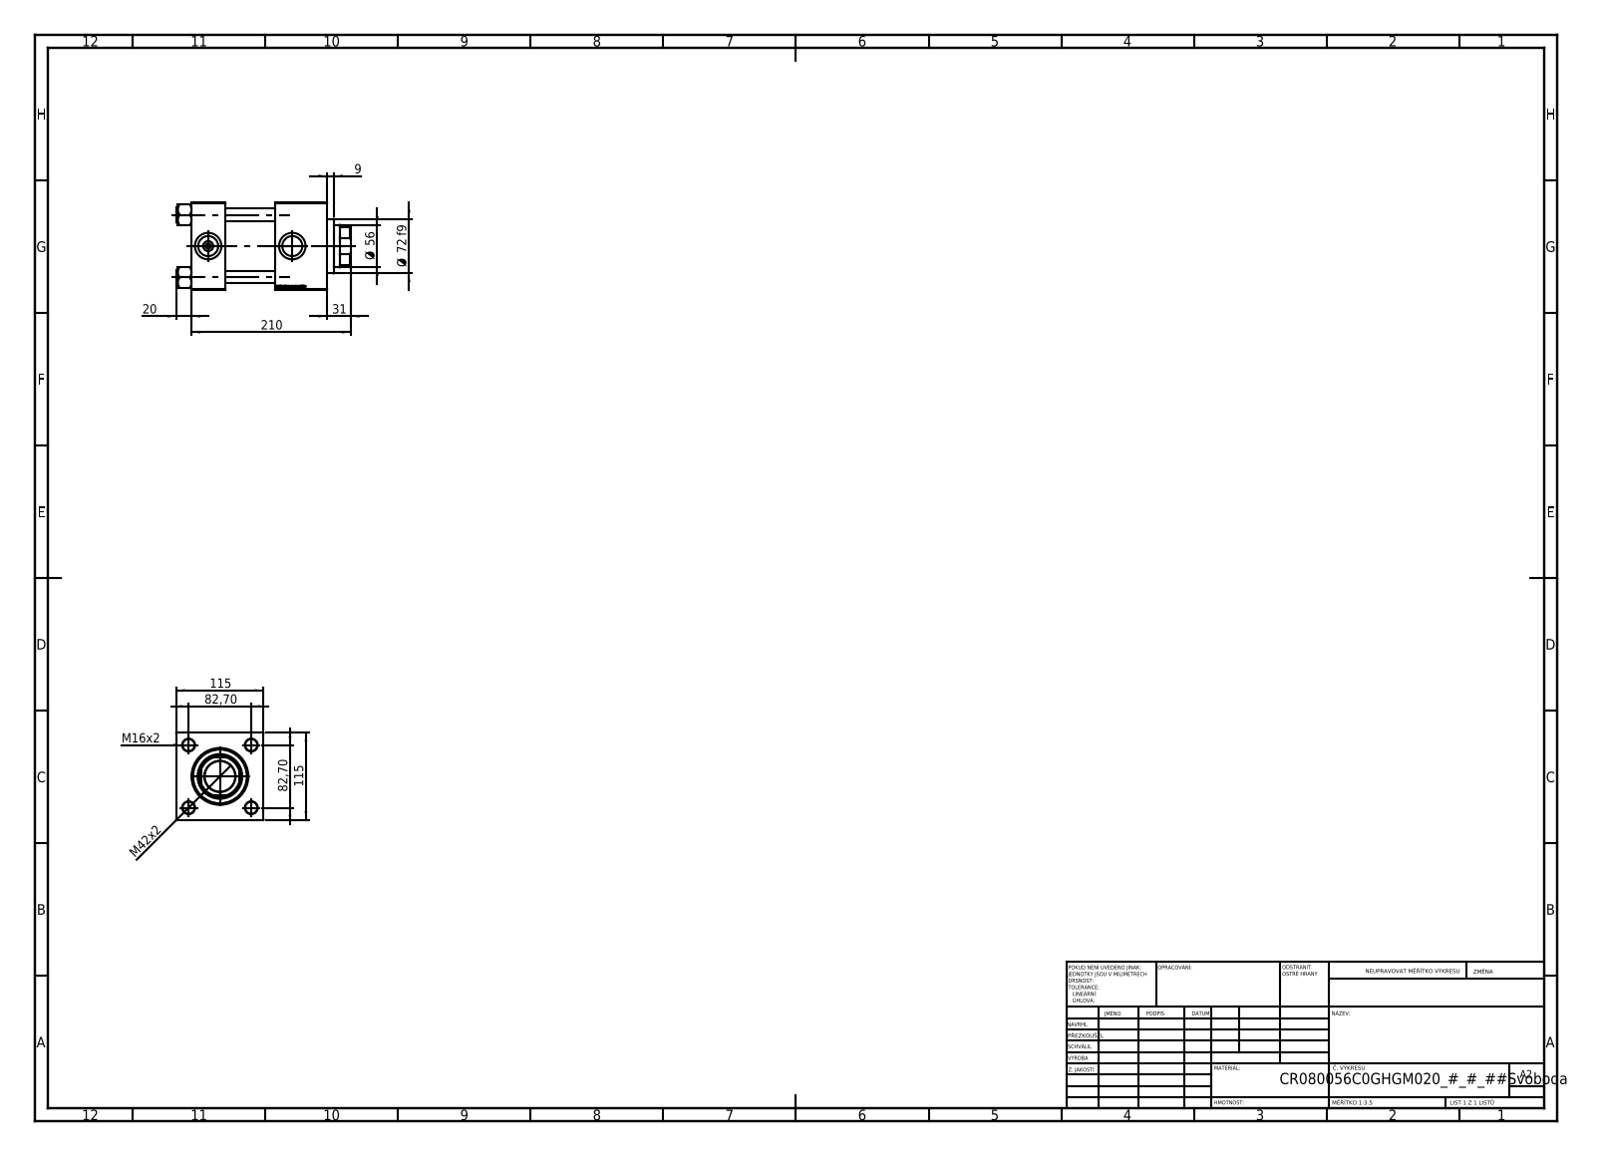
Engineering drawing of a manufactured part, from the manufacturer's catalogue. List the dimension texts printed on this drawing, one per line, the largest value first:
210
115
115
82,70
82,70
Ø 72 f9
Ø 56
M42x2
31
20
M16x2
9
